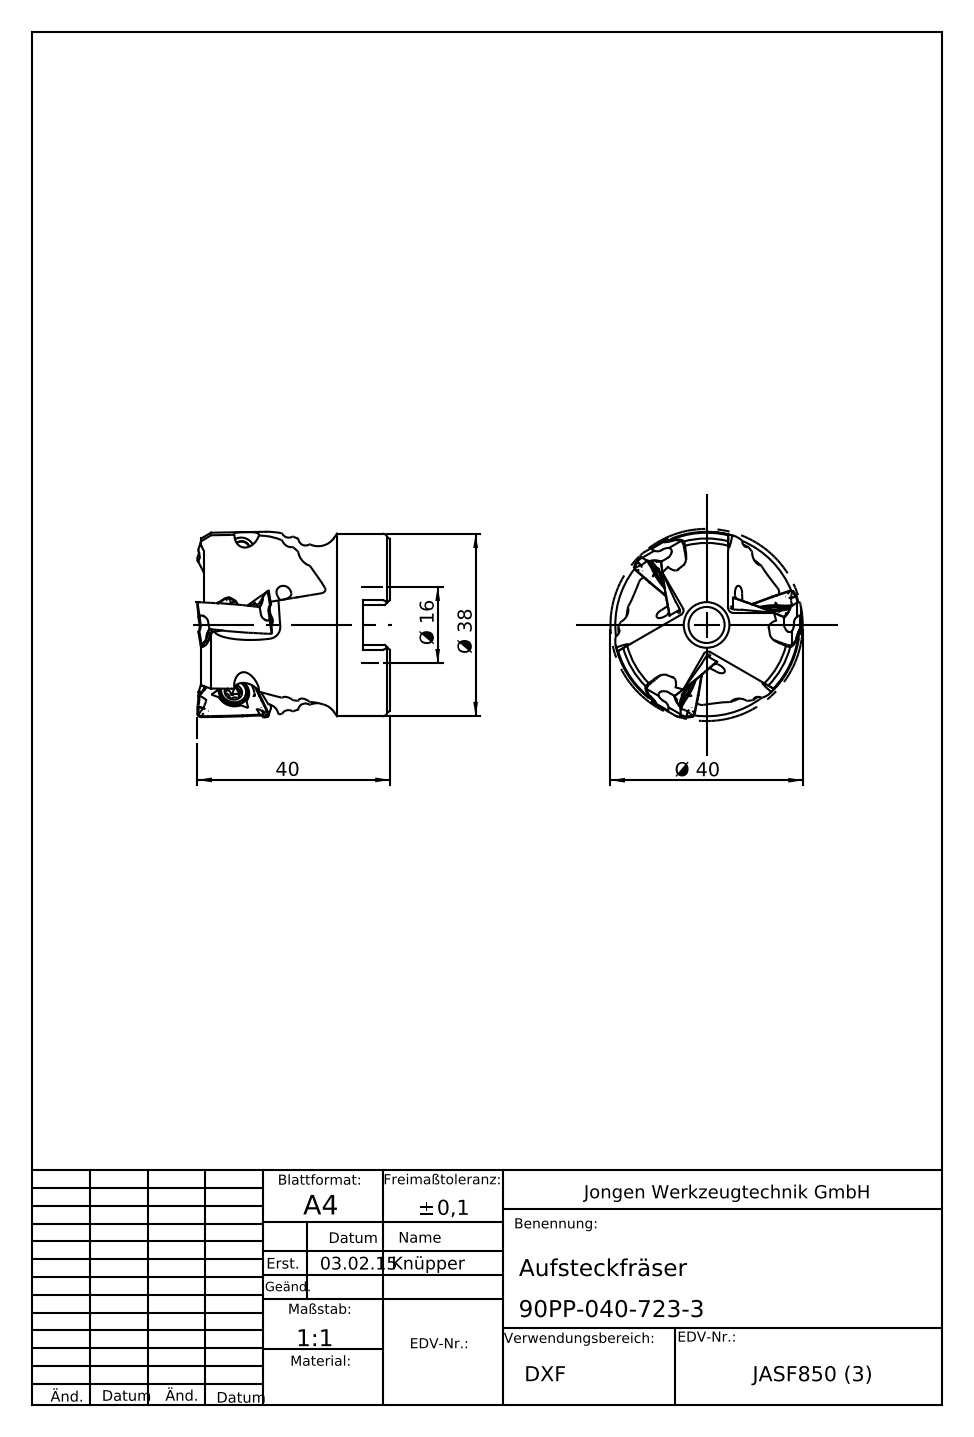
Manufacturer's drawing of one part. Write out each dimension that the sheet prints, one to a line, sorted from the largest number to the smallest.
40
Ø 40
Ø 38
Ø 16
